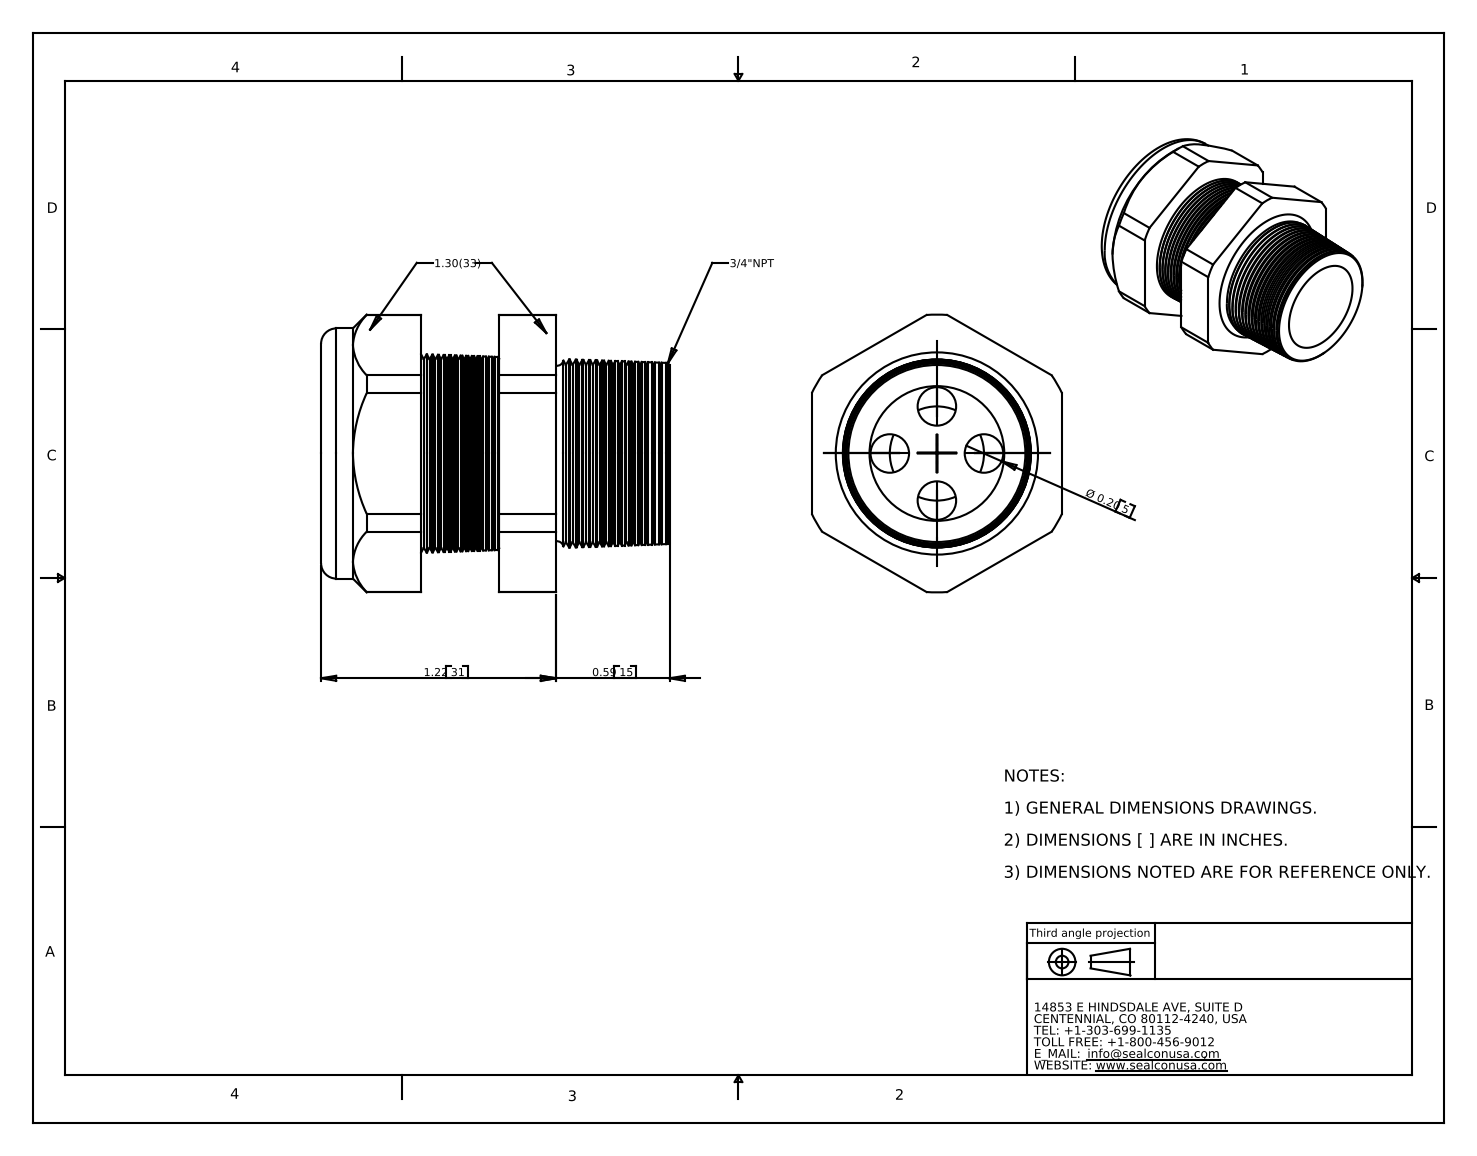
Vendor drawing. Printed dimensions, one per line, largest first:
1.22 31
0.59 15
Ø 0.20 5
